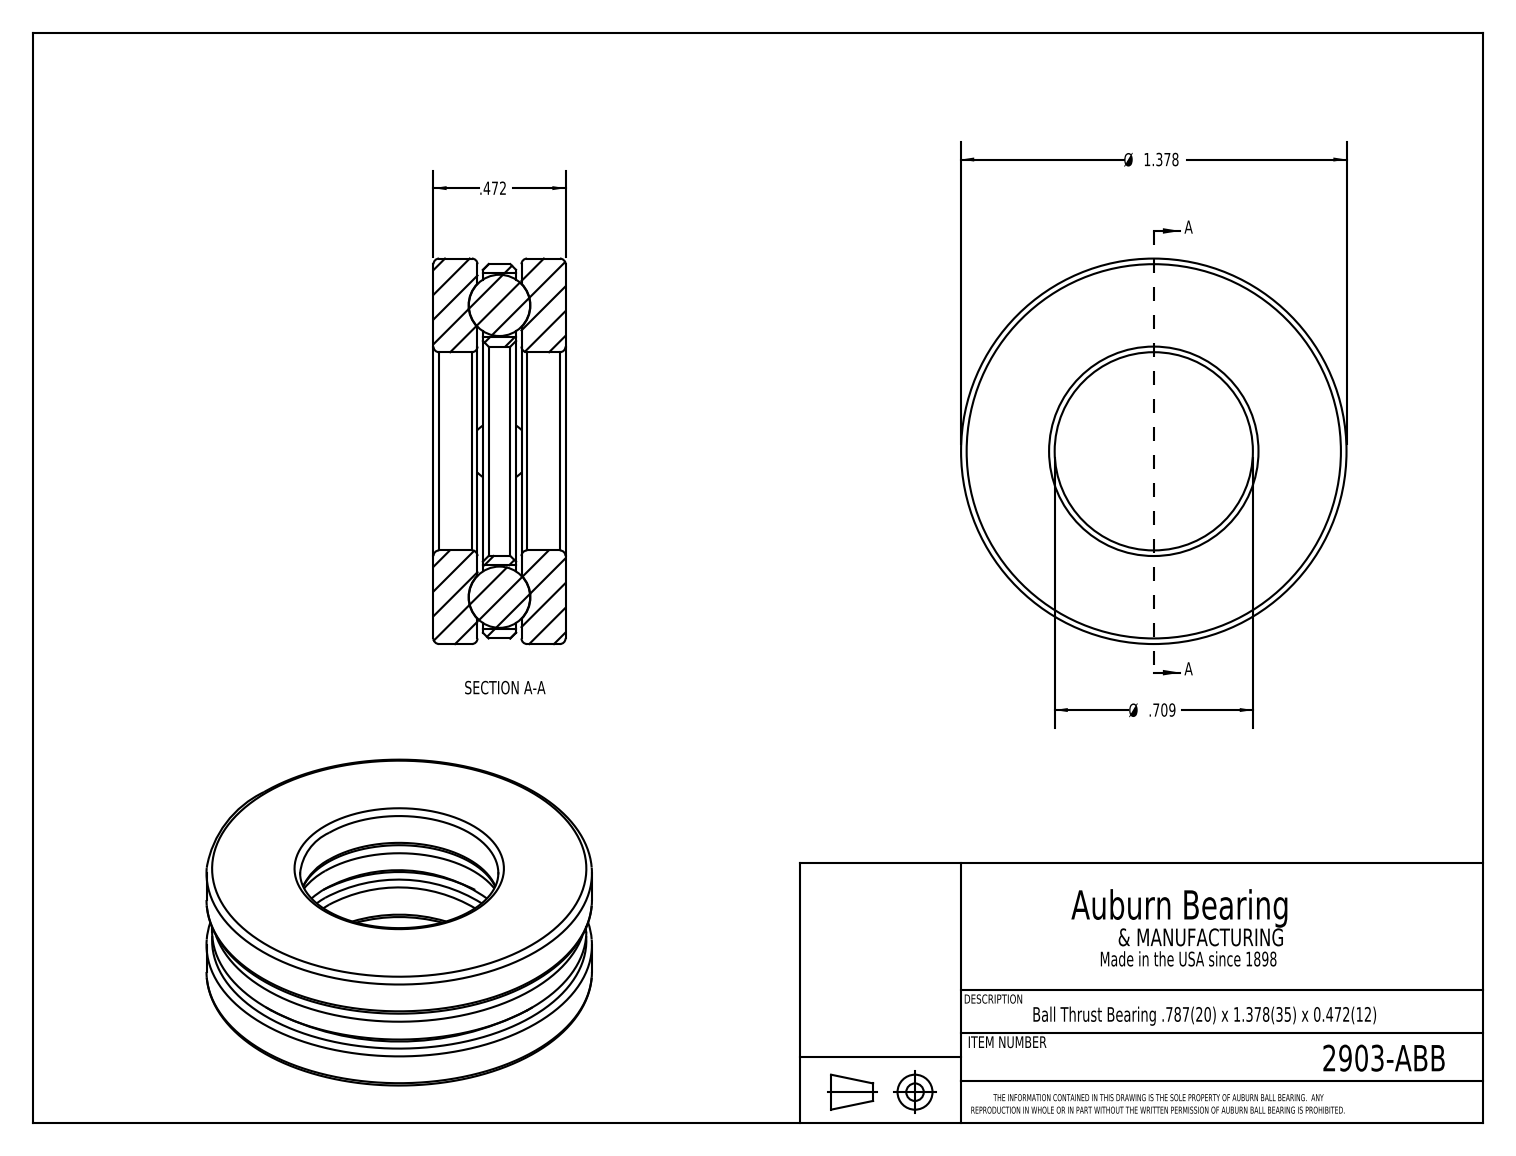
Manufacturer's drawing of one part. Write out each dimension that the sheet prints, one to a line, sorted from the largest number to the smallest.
Ø 1.378
Ø .709
.472
